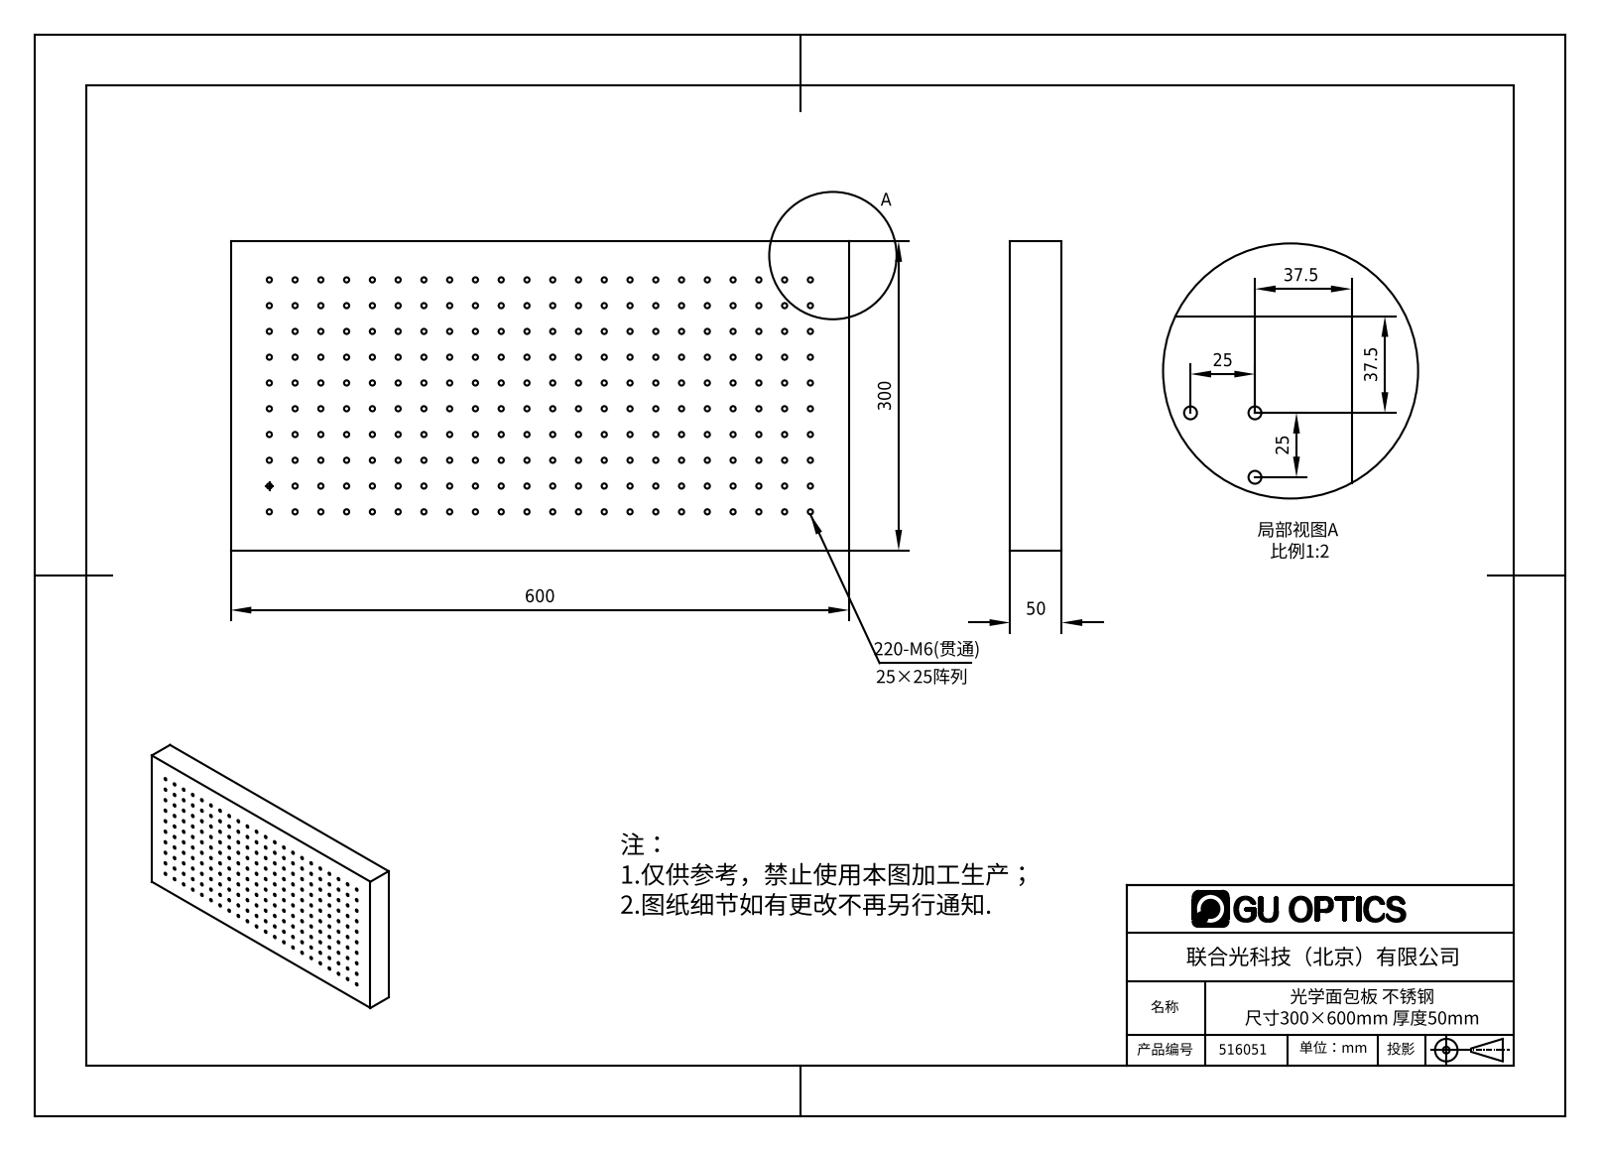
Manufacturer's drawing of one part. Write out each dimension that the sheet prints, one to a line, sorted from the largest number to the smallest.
600
300
50
37.5
37.5
25
25
